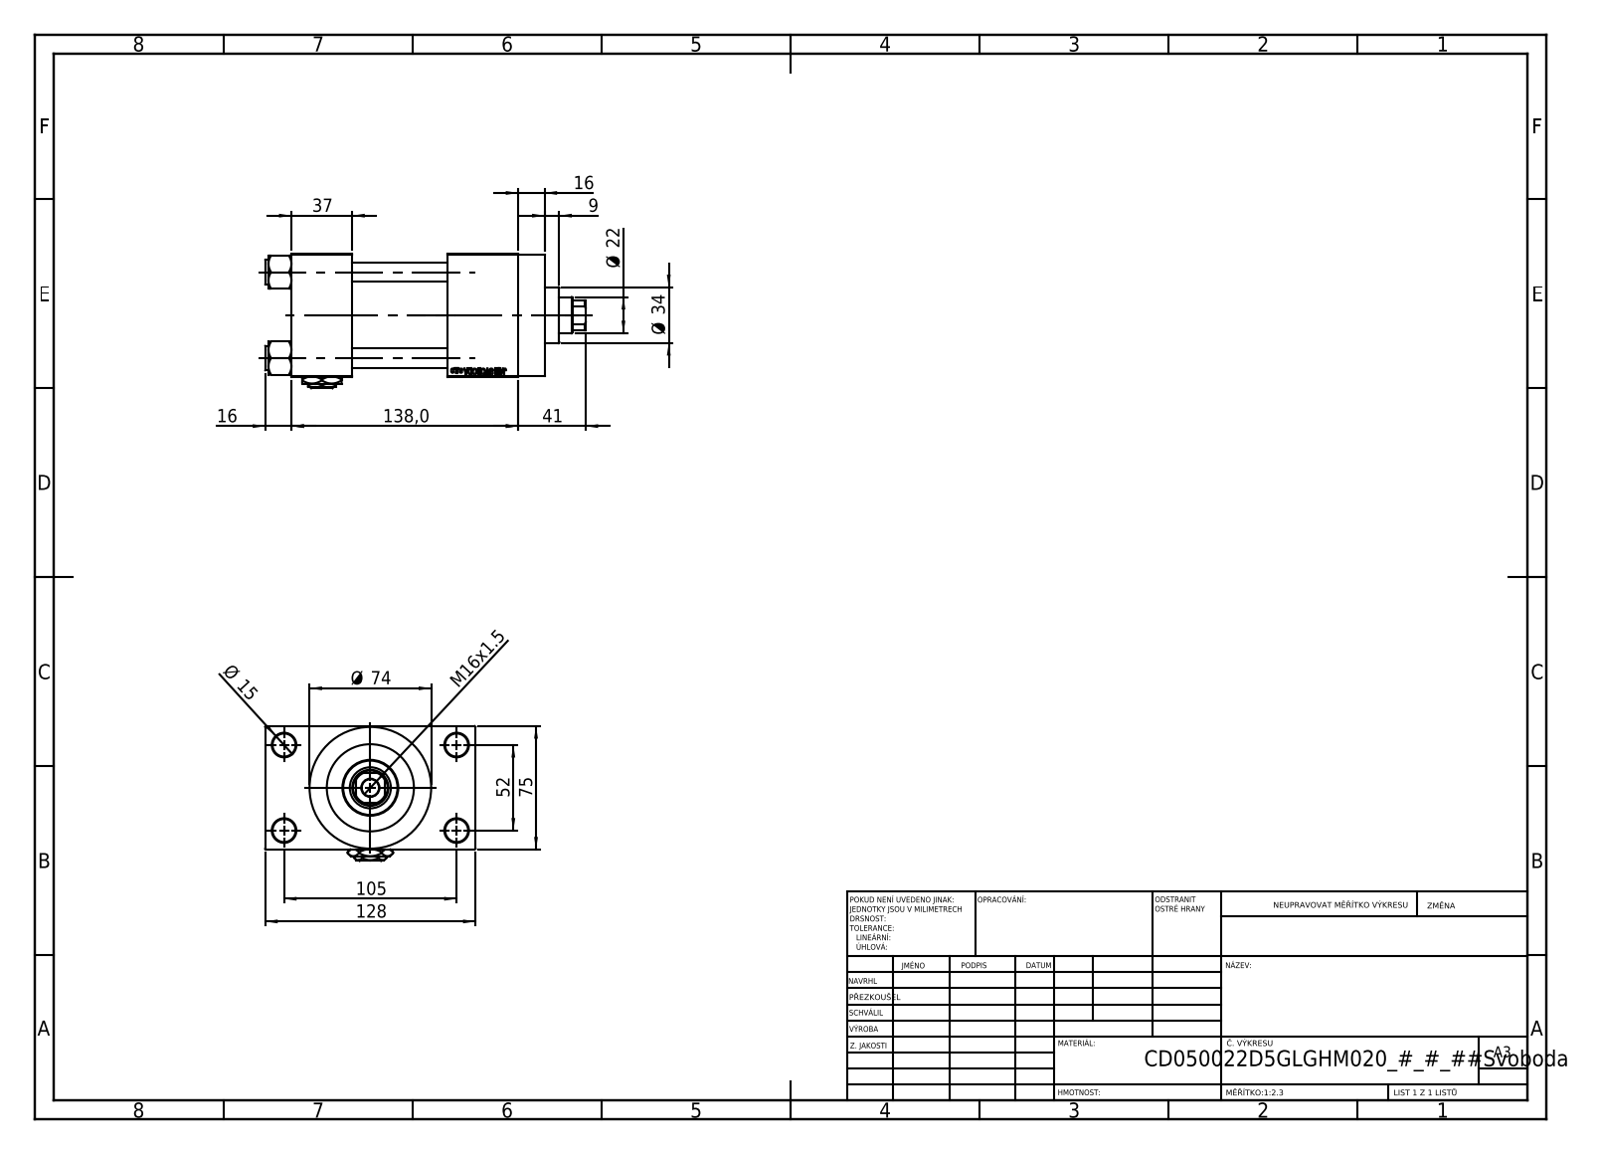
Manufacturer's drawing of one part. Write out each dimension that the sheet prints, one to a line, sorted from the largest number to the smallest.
138,0
128
105
75
Ø 74
52
41
37
Ø 34
Ø 22
16
16
M16x1.5
Ø 15
9
